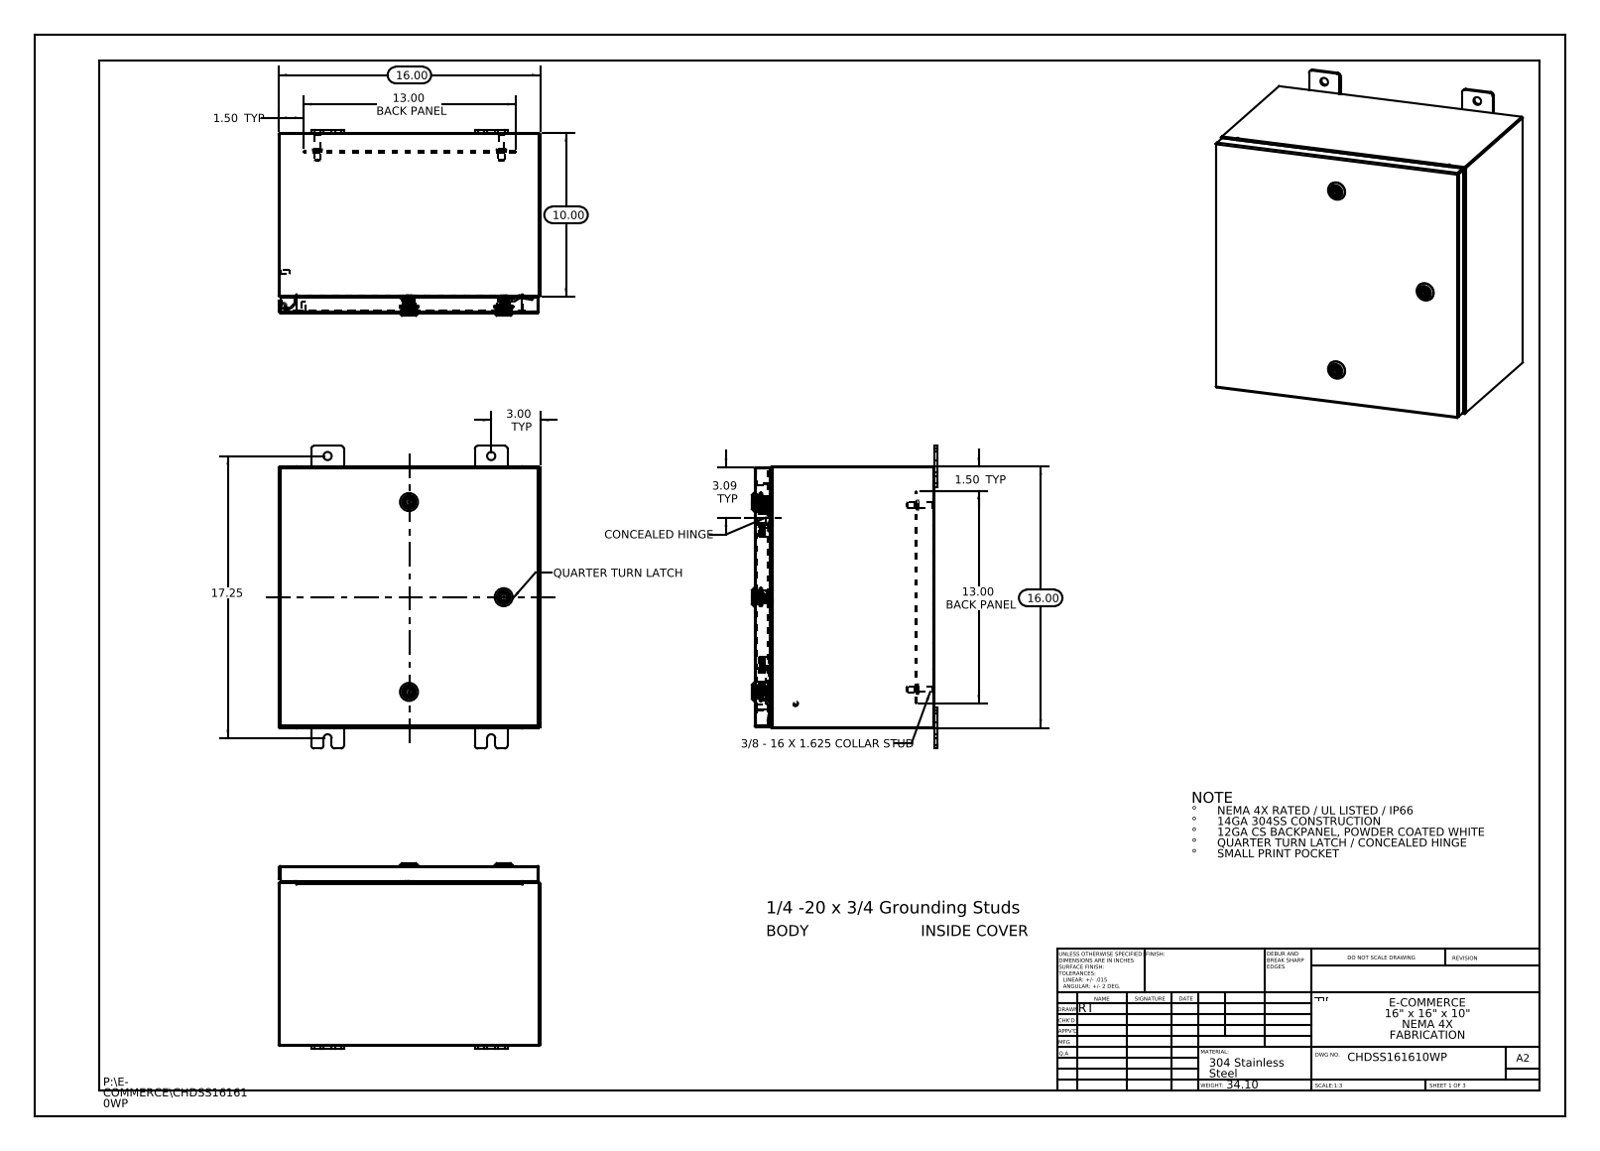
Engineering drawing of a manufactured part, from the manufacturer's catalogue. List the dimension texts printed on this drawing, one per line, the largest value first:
17.25
16.00
16.00
13.00 BACK PANEL
13.00 BACK PANEL
10.00
3.09 TYP
3.00 TYP
1.50 TYP
1.50 TYP
